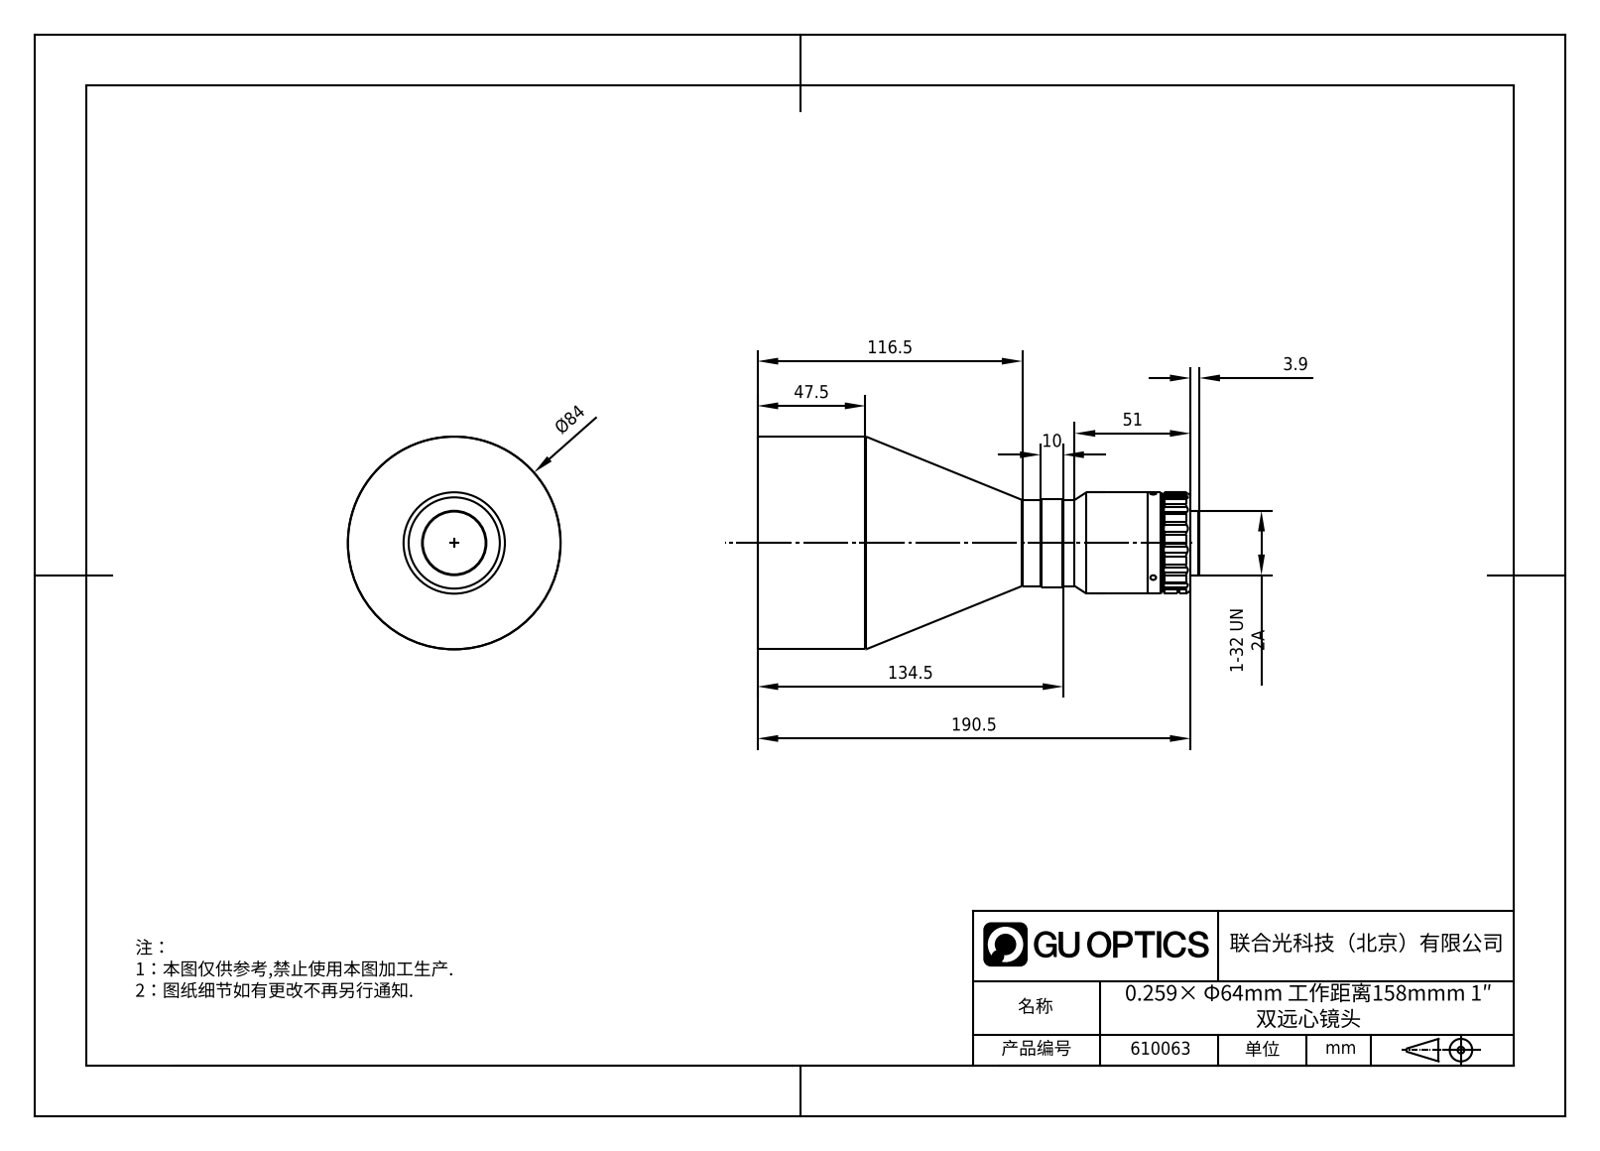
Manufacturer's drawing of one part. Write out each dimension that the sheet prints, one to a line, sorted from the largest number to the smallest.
190.5
134.5
116.5
Ø84
51
47.5
10
3.9
1-32 UN 2A
